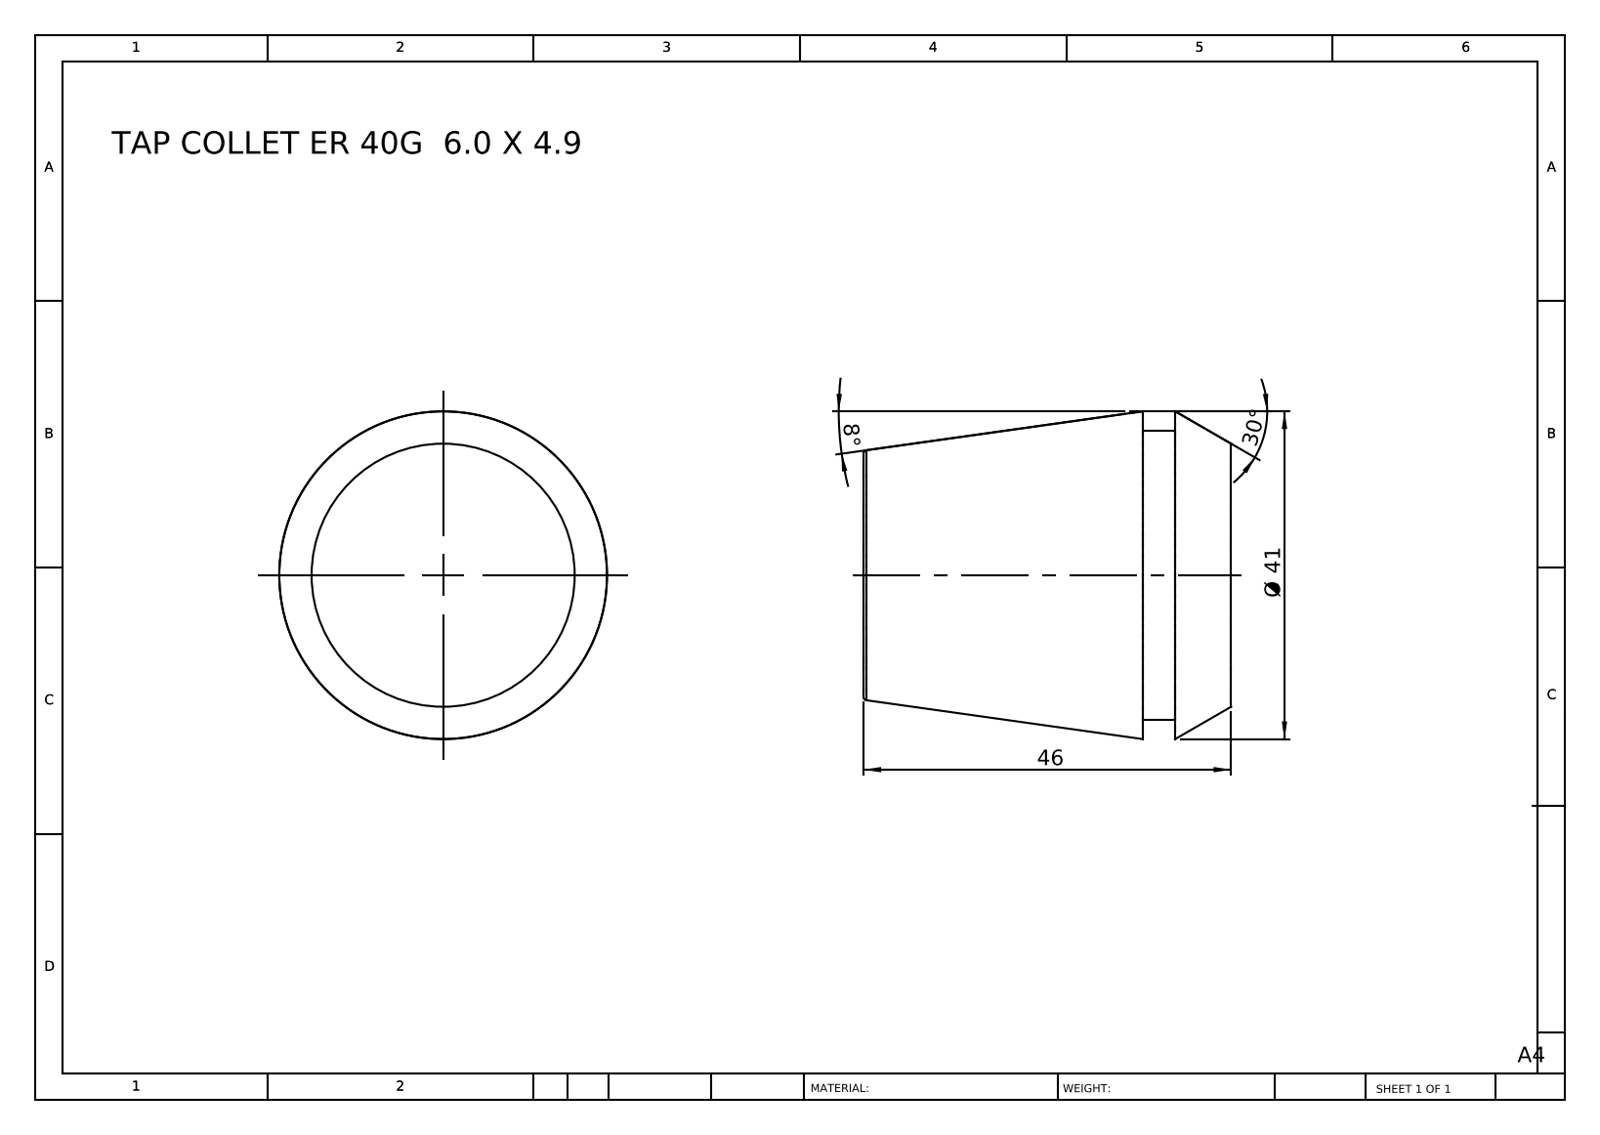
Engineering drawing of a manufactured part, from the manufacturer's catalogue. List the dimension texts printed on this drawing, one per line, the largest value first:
46
Ø 41
30°
8°
